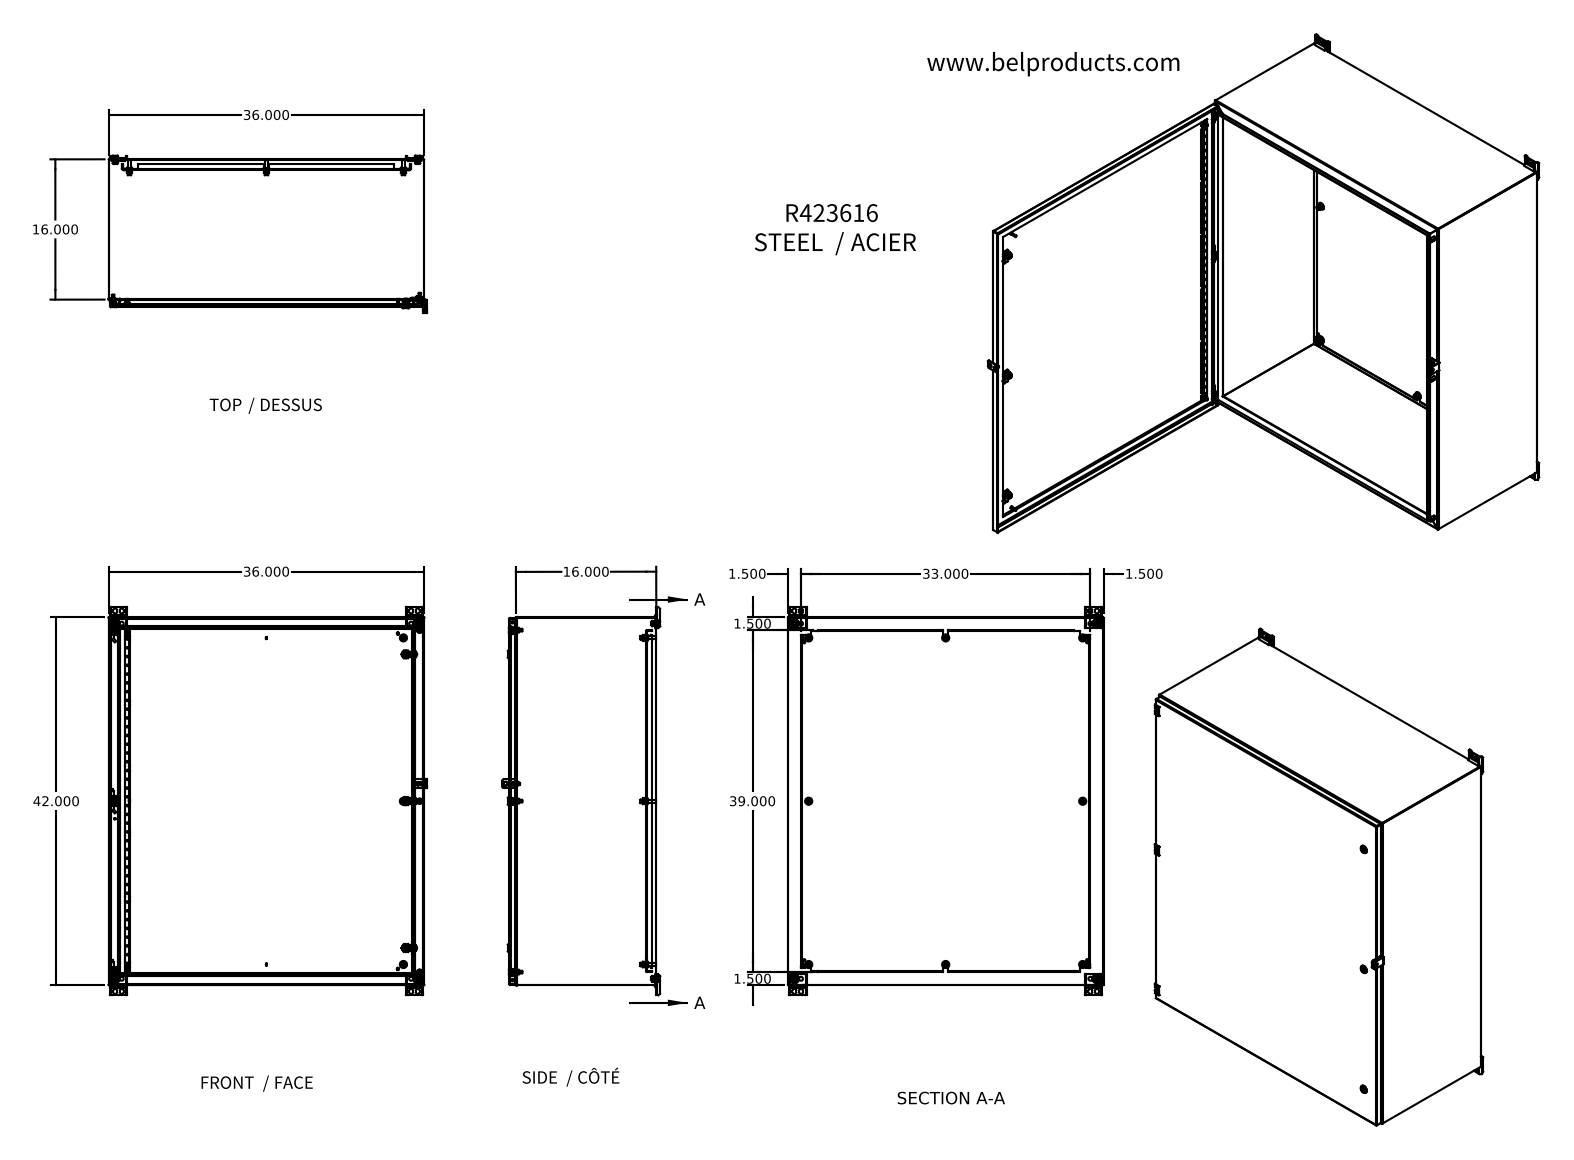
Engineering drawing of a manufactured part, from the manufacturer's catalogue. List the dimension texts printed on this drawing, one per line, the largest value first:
42.000
39.000
36.000
36.000
33.000
16.000
16.000
1.500
1.500
1.500
1.500
